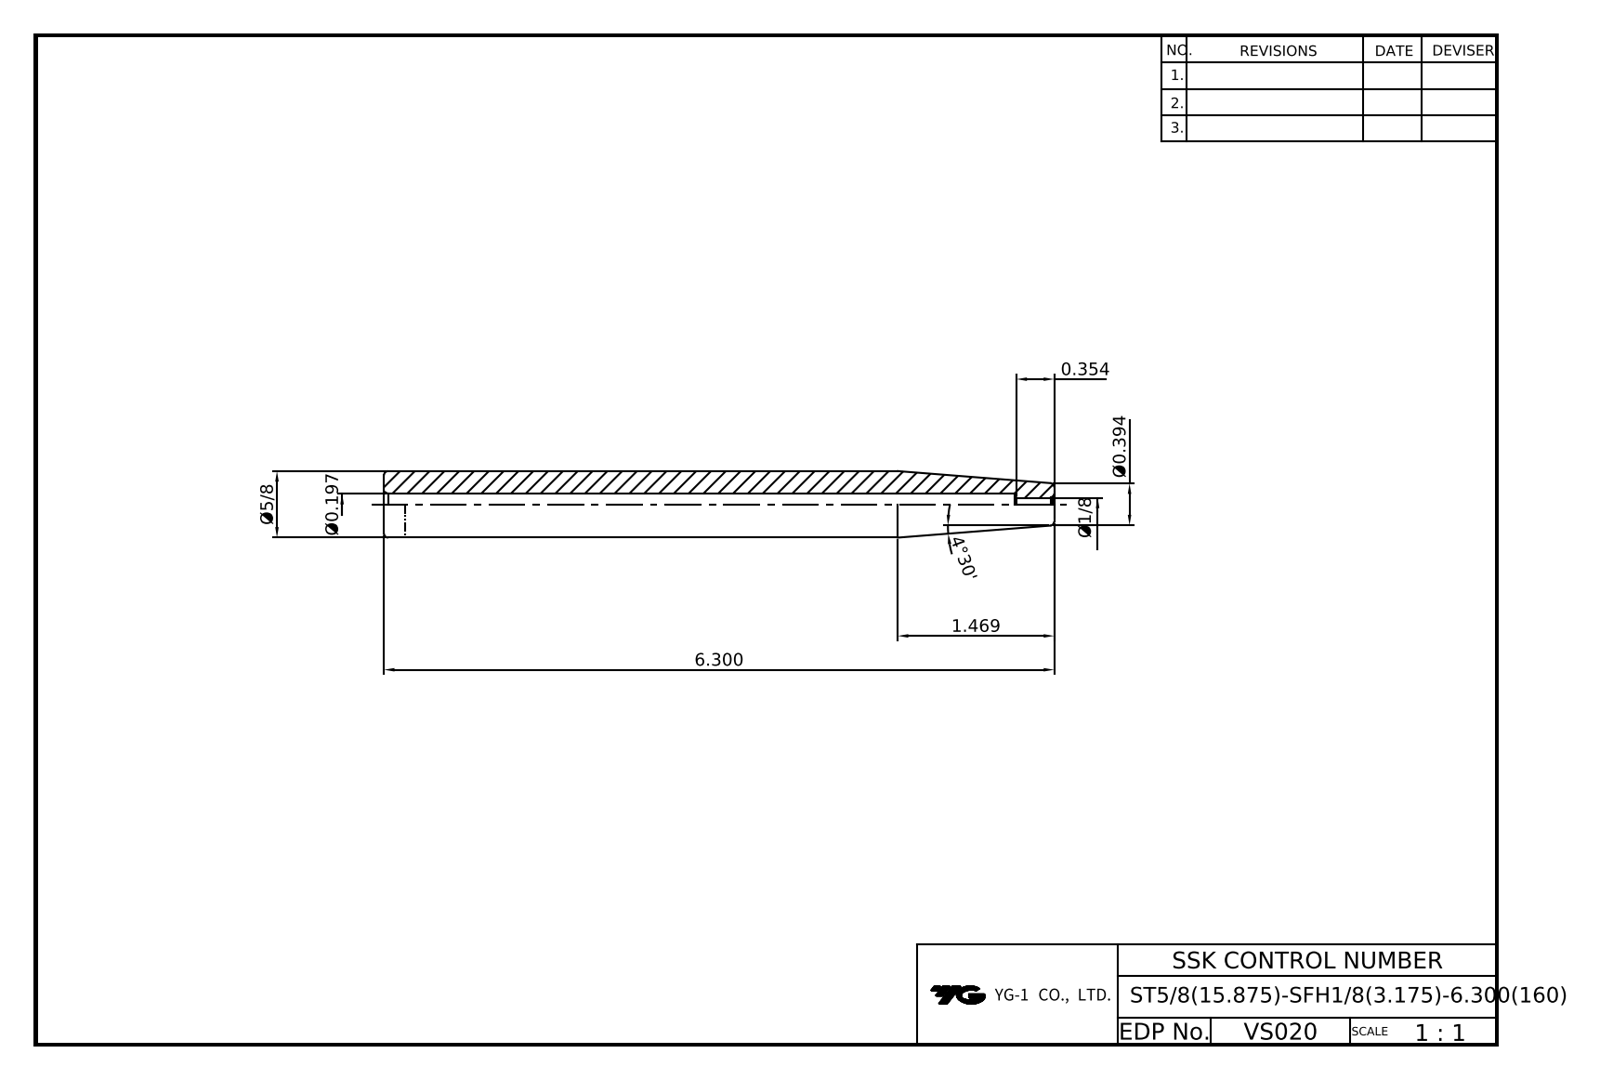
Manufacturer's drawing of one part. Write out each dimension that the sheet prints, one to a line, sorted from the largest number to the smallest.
6.300
4°30'
1.469
Ø5/8
Ø0.394
0.354
